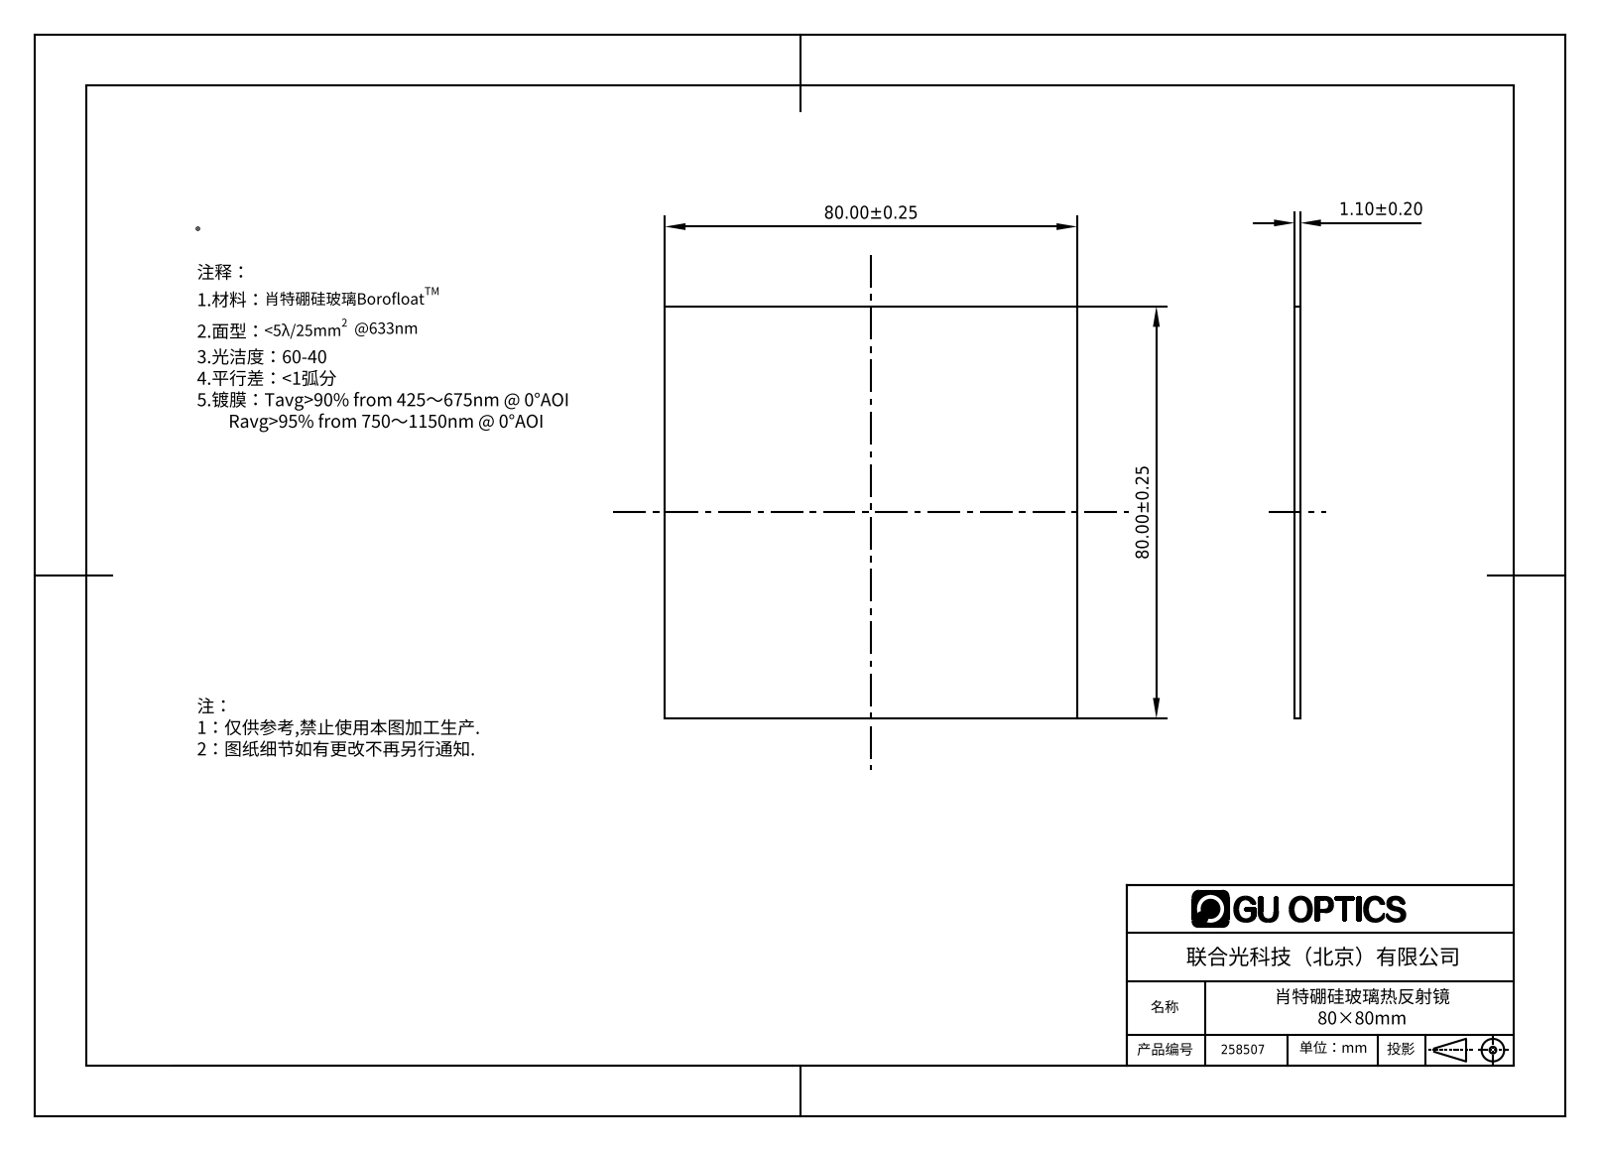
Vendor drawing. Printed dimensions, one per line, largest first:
80.00±0.25
80.00±0.25
1.10±0.20
